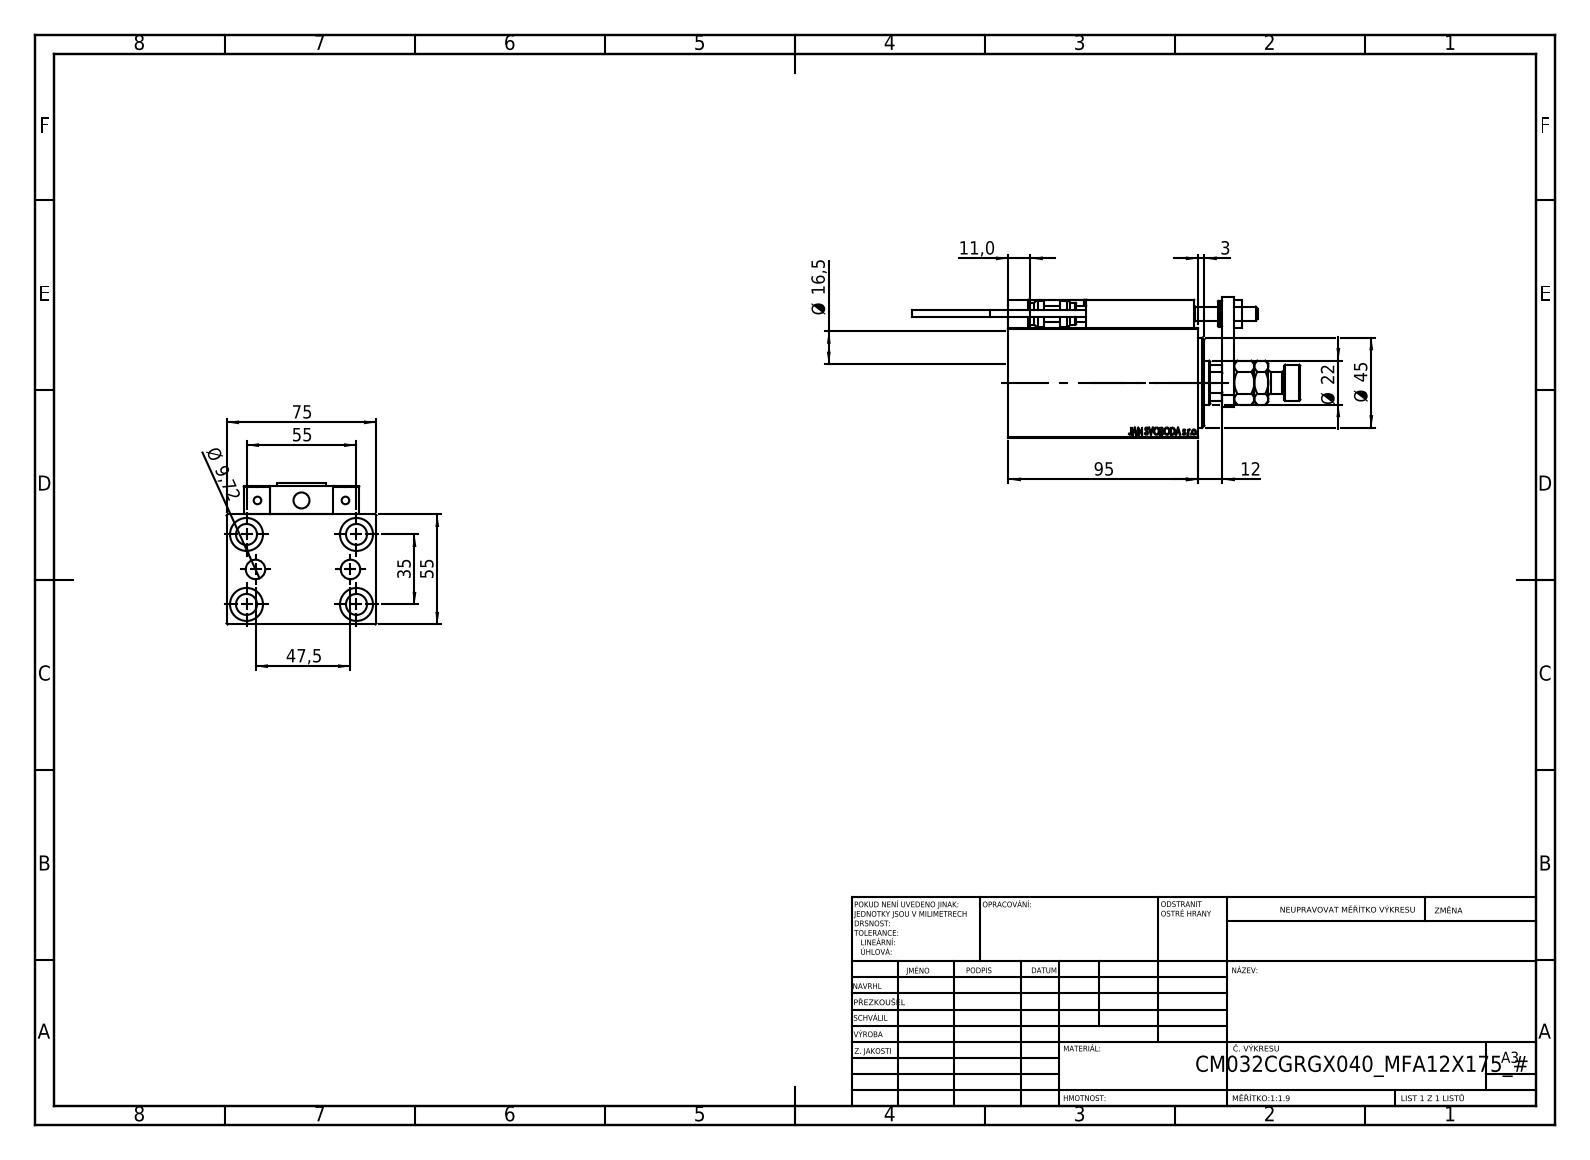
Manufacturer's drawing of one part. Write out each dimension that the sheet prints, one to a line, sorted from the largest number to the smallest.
95
75
55
55
47,5
Ø 45
35
Ø 22
Ø 16,5
12
11,0
Ø 9,72
3
